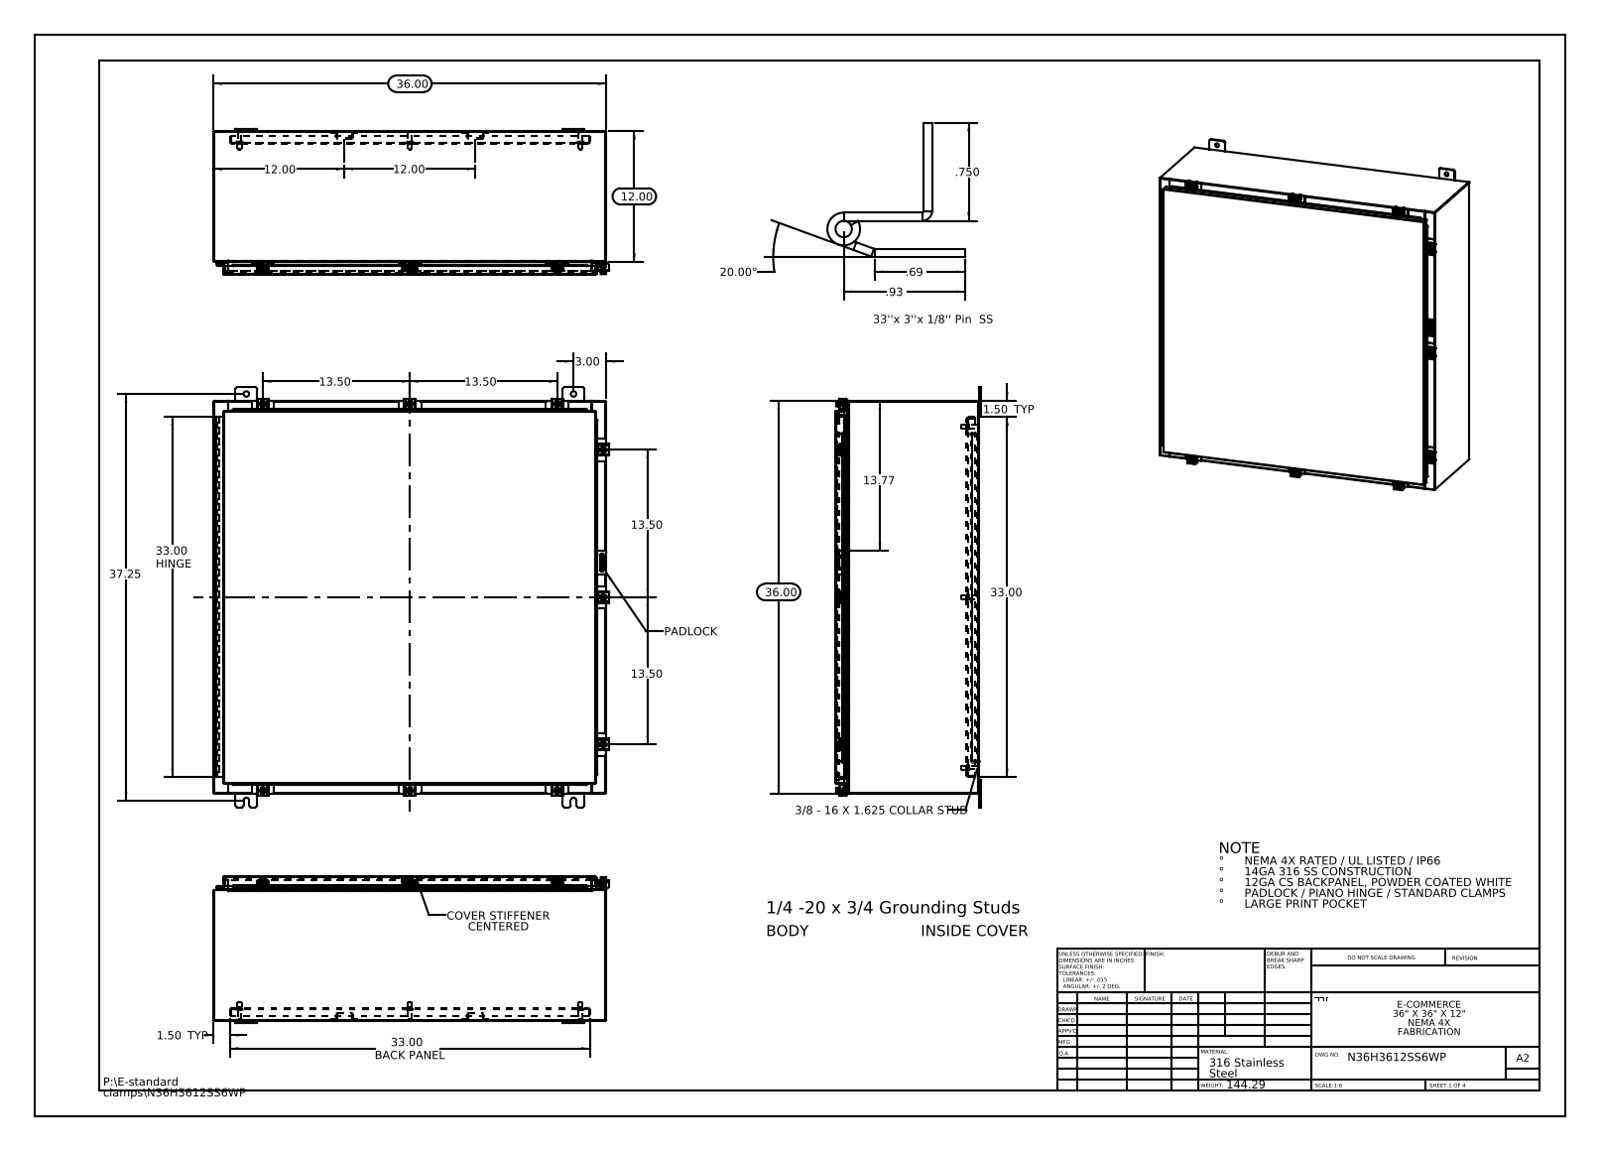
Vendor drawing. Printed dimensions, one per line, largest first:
37.25
36.00
36.00
33.00 HINGE
33.00 BACK PANEL
33.00
20.00°
13.77
13.50
13.50
13.50
13.50
12.00
12.00
12.00
3.00
1.50 TYP
1.50 TYP
.93
.750
.69
